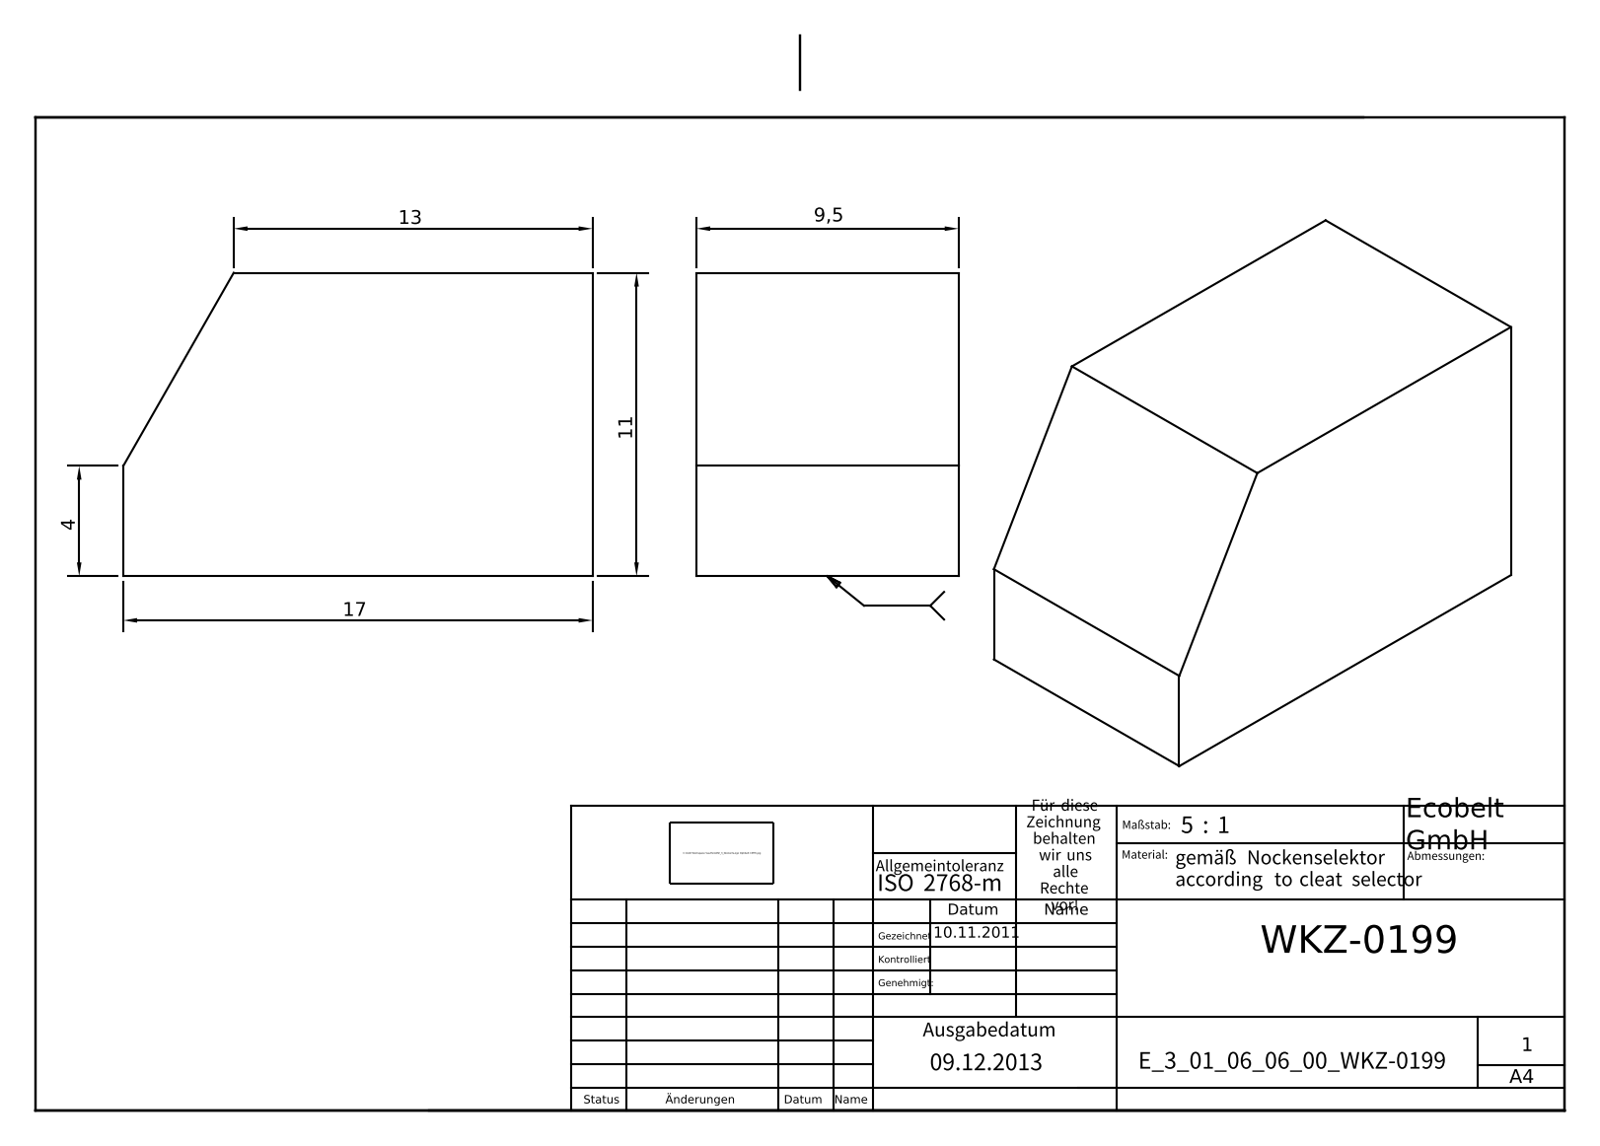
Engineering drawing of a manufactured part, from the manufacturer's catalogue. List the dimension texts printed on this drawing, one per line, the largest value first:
17
13
11
9,5
4
